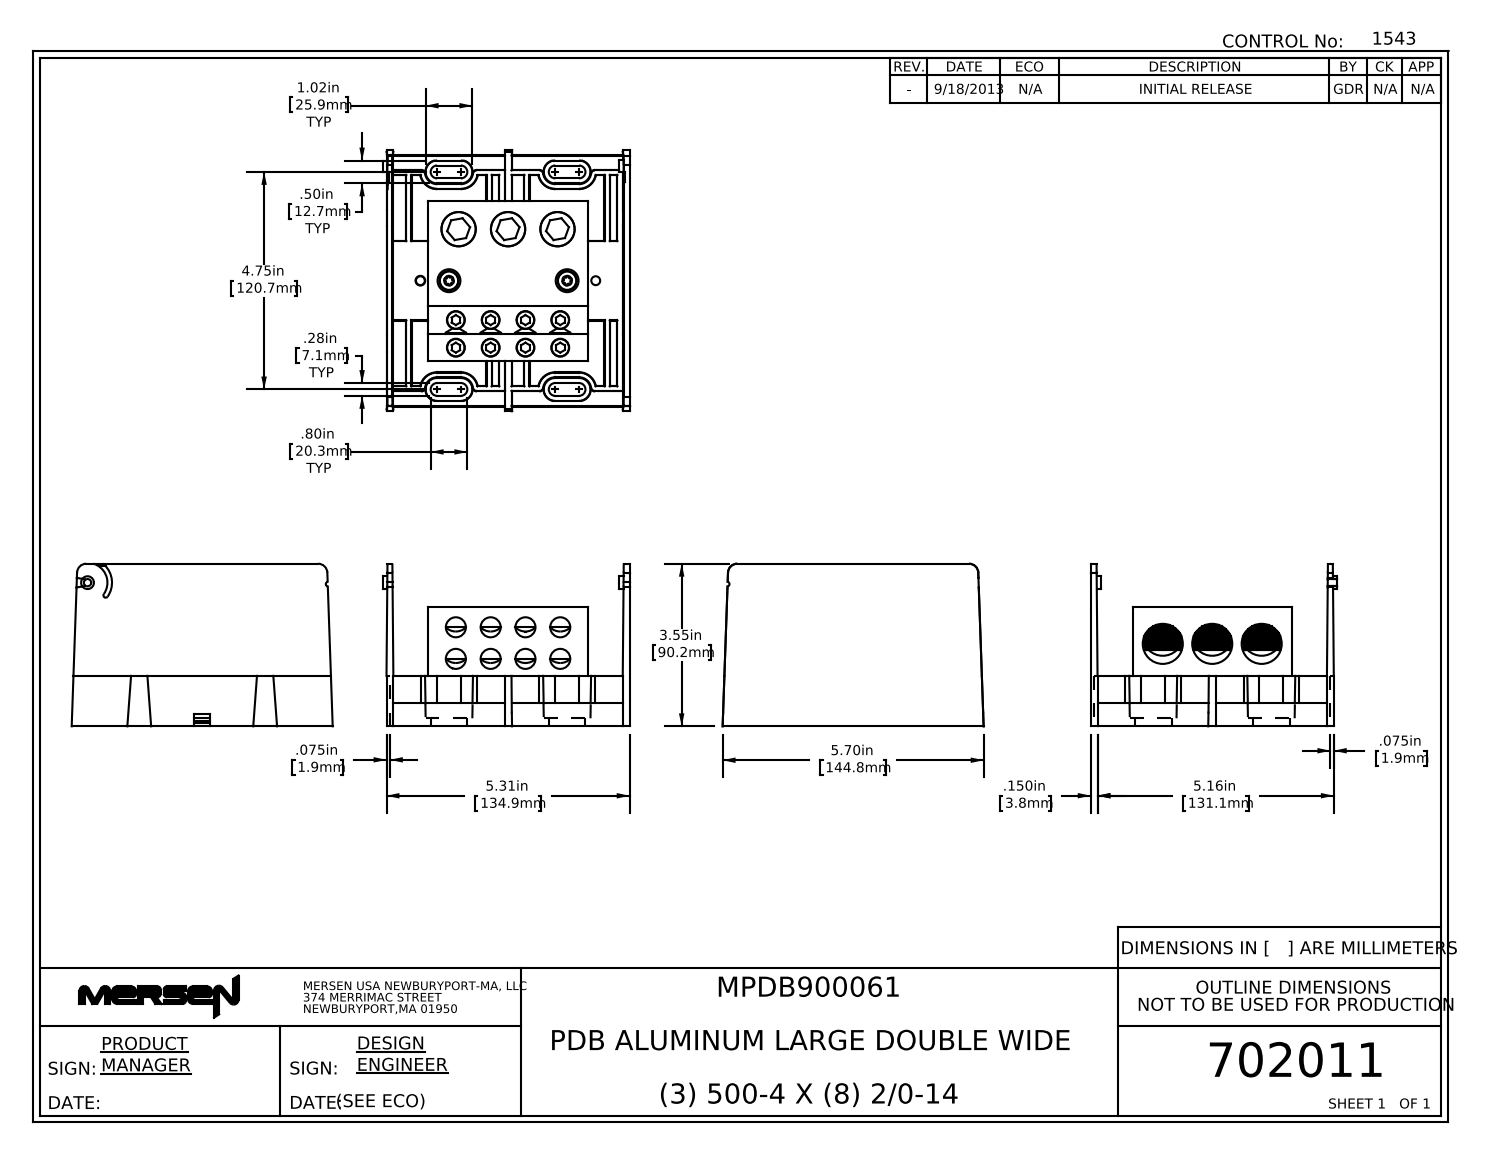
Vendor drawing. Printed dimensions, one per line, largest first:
5.70in 144.8mm
5.31in 134.9mm
5.16in 131.1mm
4.75in 120.7mm
3.55in 90.2mm
1.02in 25.9mm TYP
.80in 20.3mm TYP
.50in 12.7mm TYP
.28in 7.1mm TYP
.150in 3.8mm
.075in 1.9mm
.075in 1.9mm
